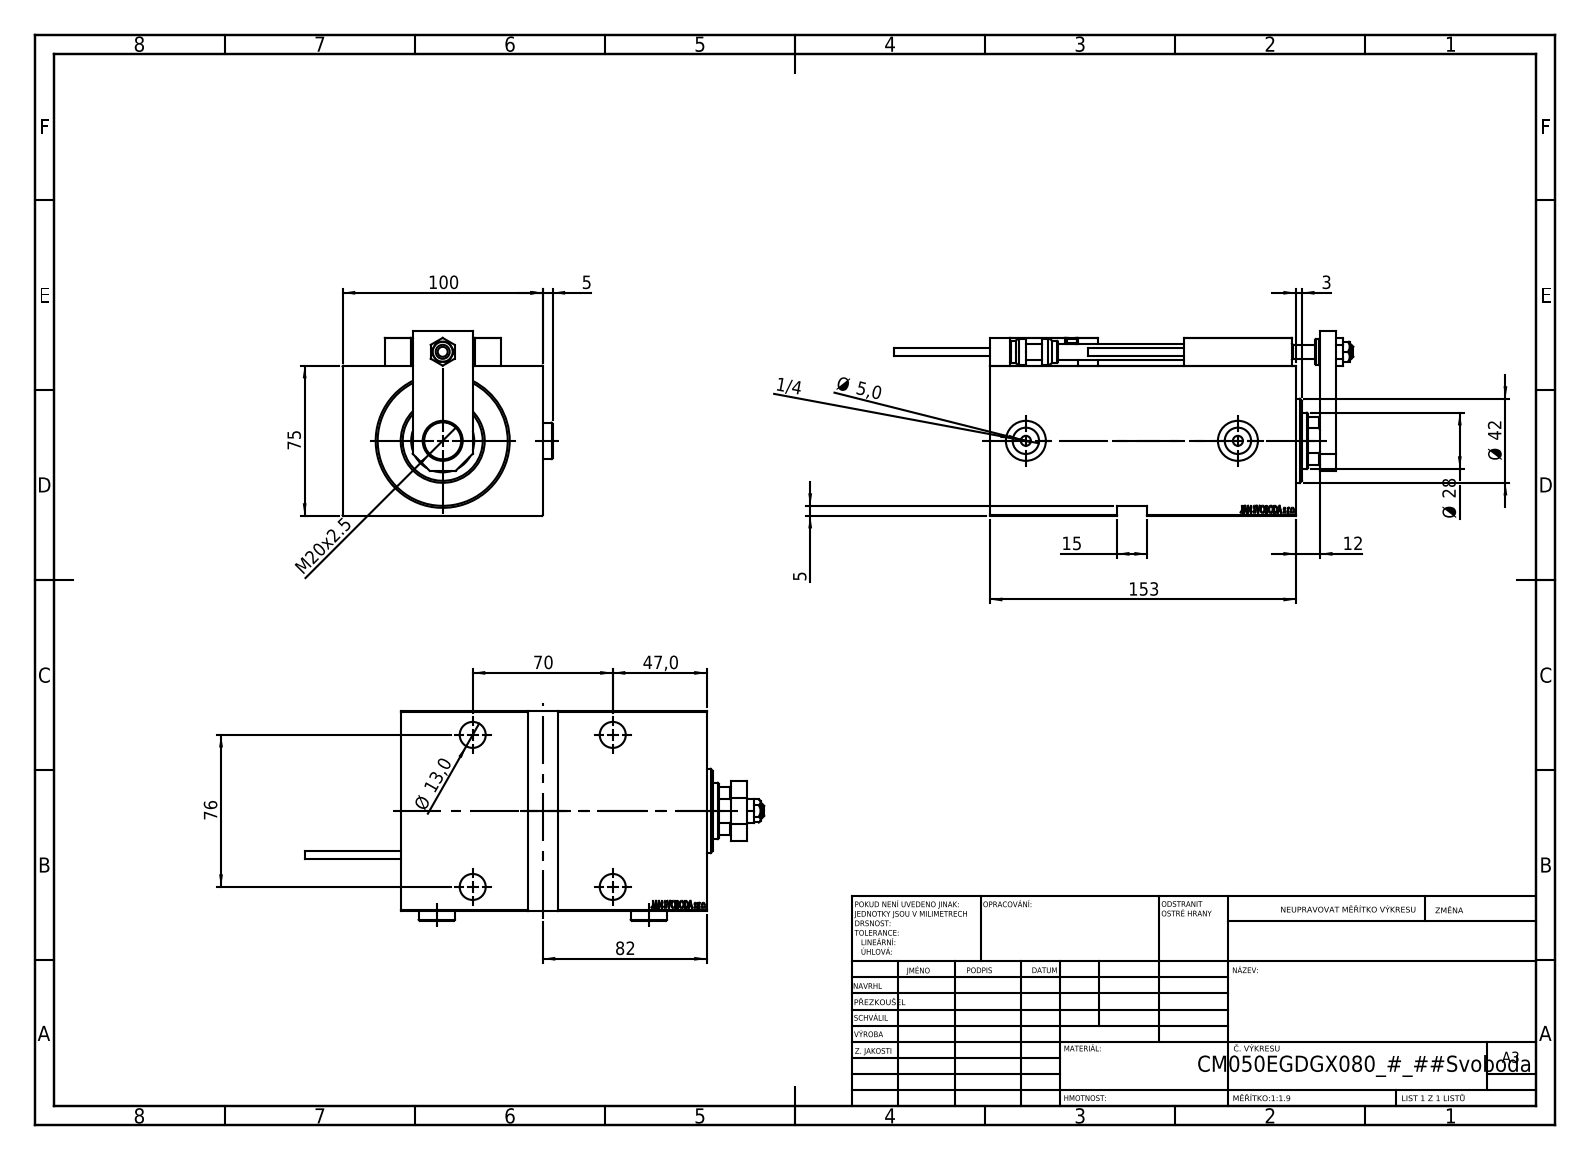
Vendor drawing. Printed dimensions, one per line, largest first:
153
100
82
76
75
70
47,0
Ø 42
Ø 28
M20x2.5
15
Ø 13,0
12
5
Ø 5,0
5
3
1/4
